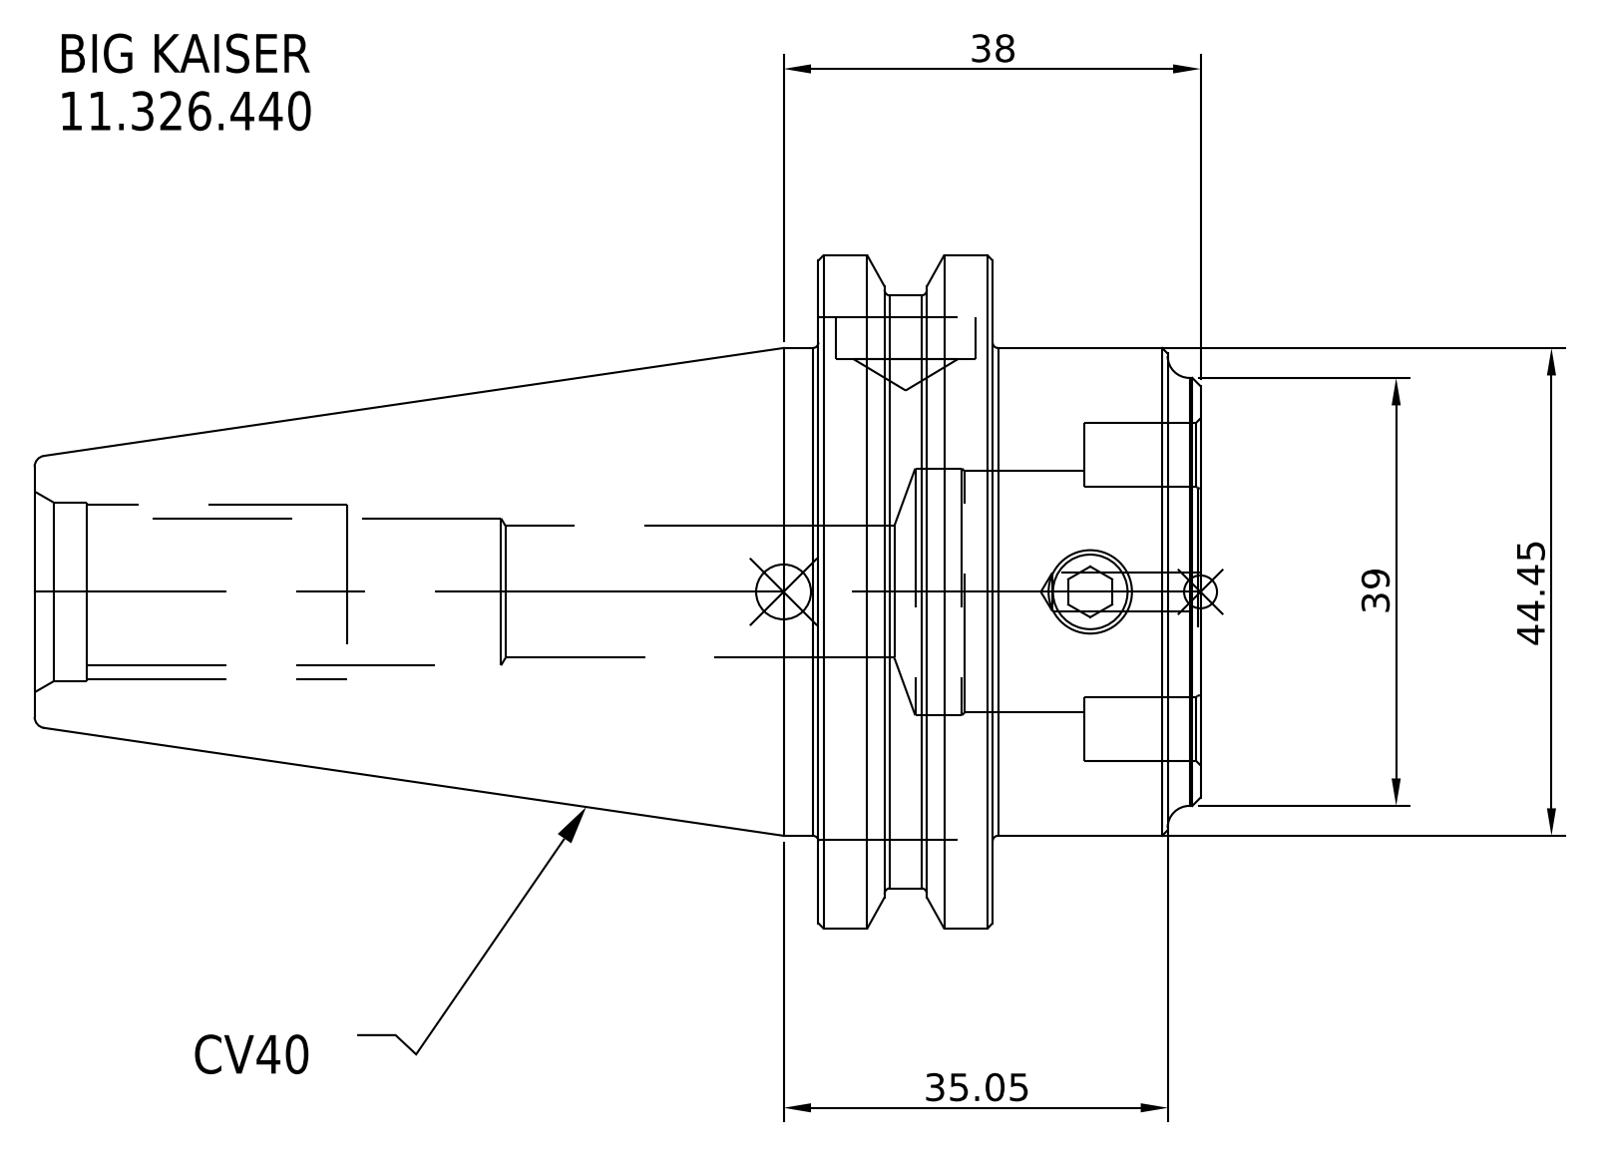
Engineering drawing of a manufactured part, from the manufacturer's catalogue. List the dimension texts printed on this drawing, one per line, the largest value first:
44.45
39
38
35.05
